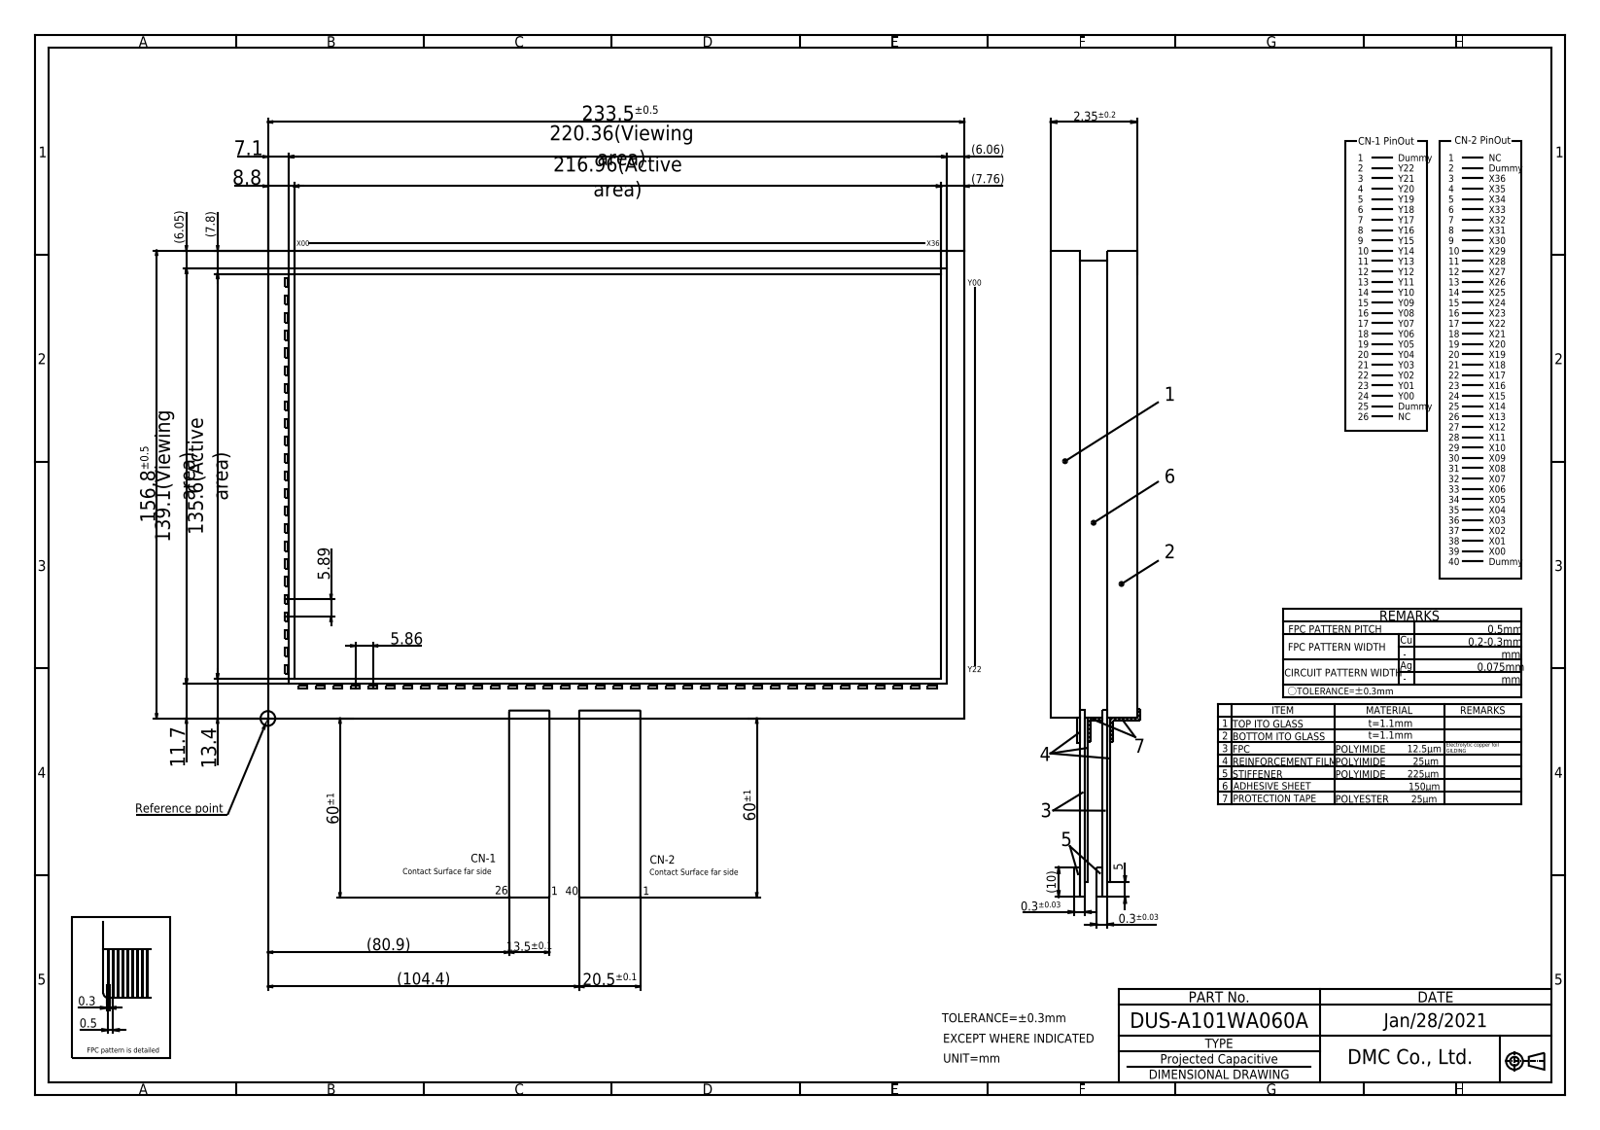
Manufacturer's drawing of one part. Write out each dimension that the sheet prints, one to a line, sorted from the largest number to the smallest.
233.5±0.5
220.36(Viewing area)
216.96(Active area)
156.8±0.5
139.1(Viewing area)
135.6(Active area)
(104.4)
(80.9)
60±1
60±1
20.5±0.1
13.5±0.1
13.4
11.7
(10)
8.8
(7.8)
(7.76)
7.1
(6.06)
(6.05)
5.89
5.86
5
2.35±0.2
0.5
0.3
0.3±0.03
0.3±0.03
